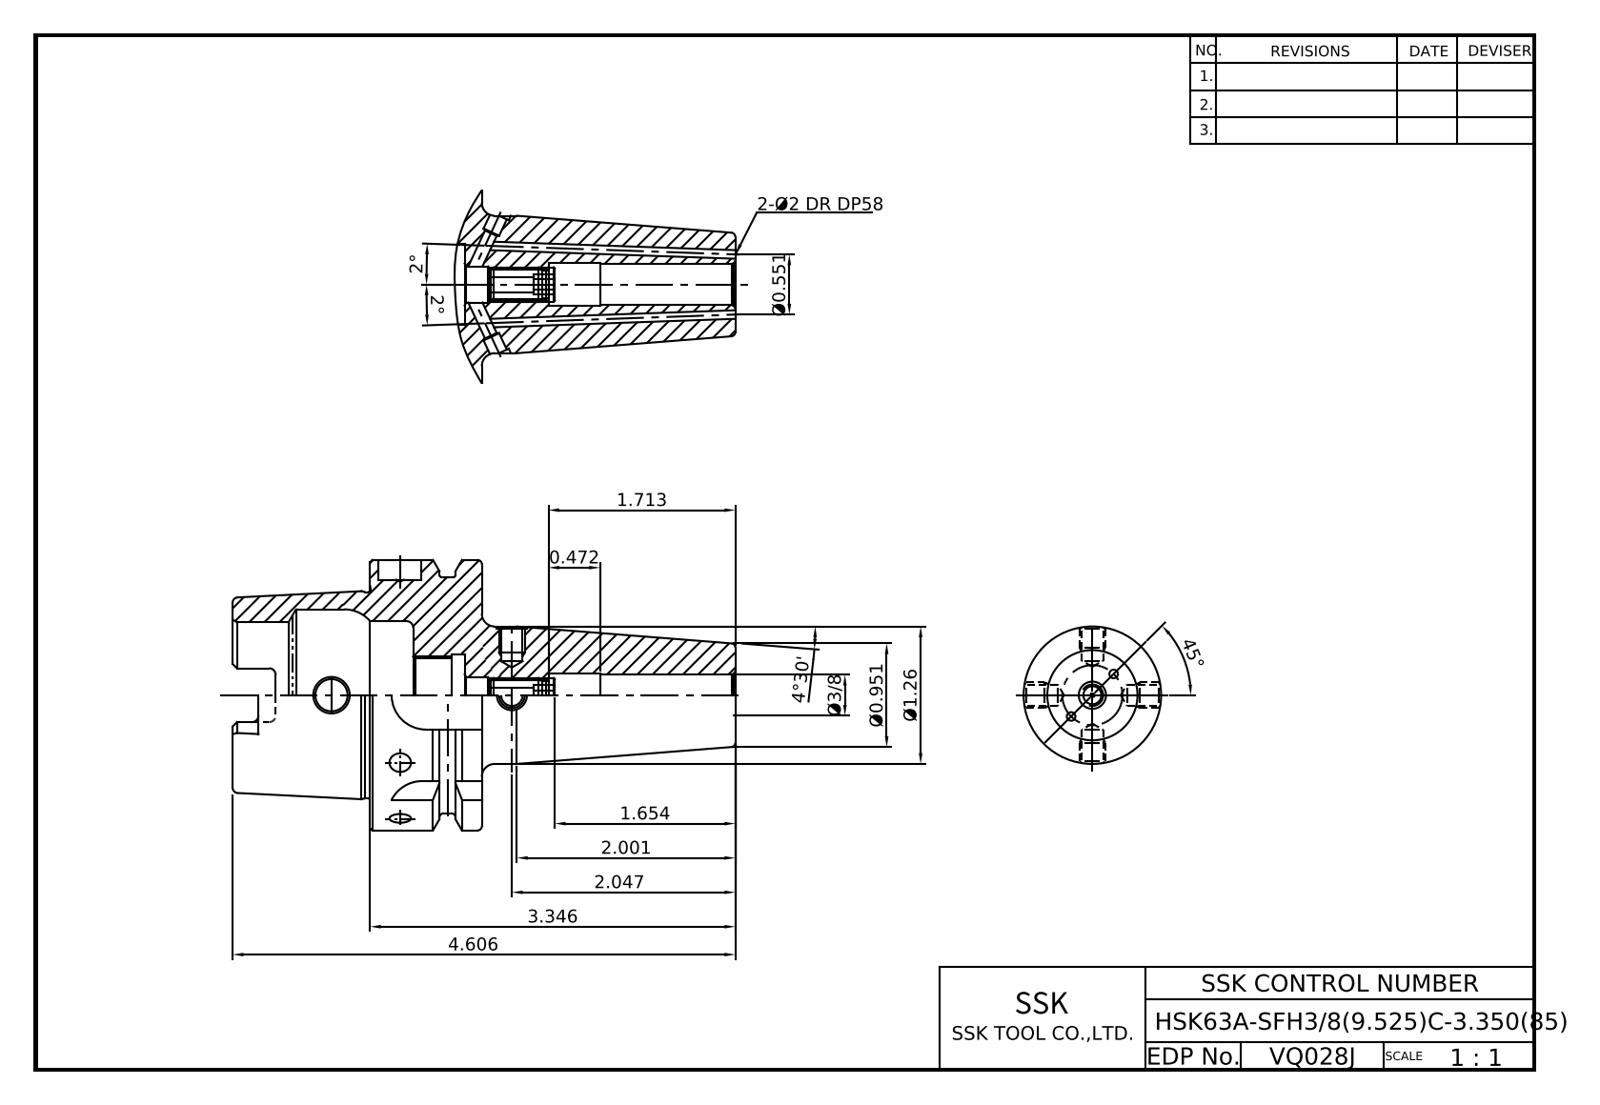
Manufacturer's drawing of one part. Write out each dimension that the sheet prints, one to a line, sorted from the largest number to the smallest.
45°
4.606
4°30'
3.346
2.047
2.001
2°
2°
1.713
1.654
Ø1.26
Ø0.951
Ø0.551
0.472
Ø3/8
